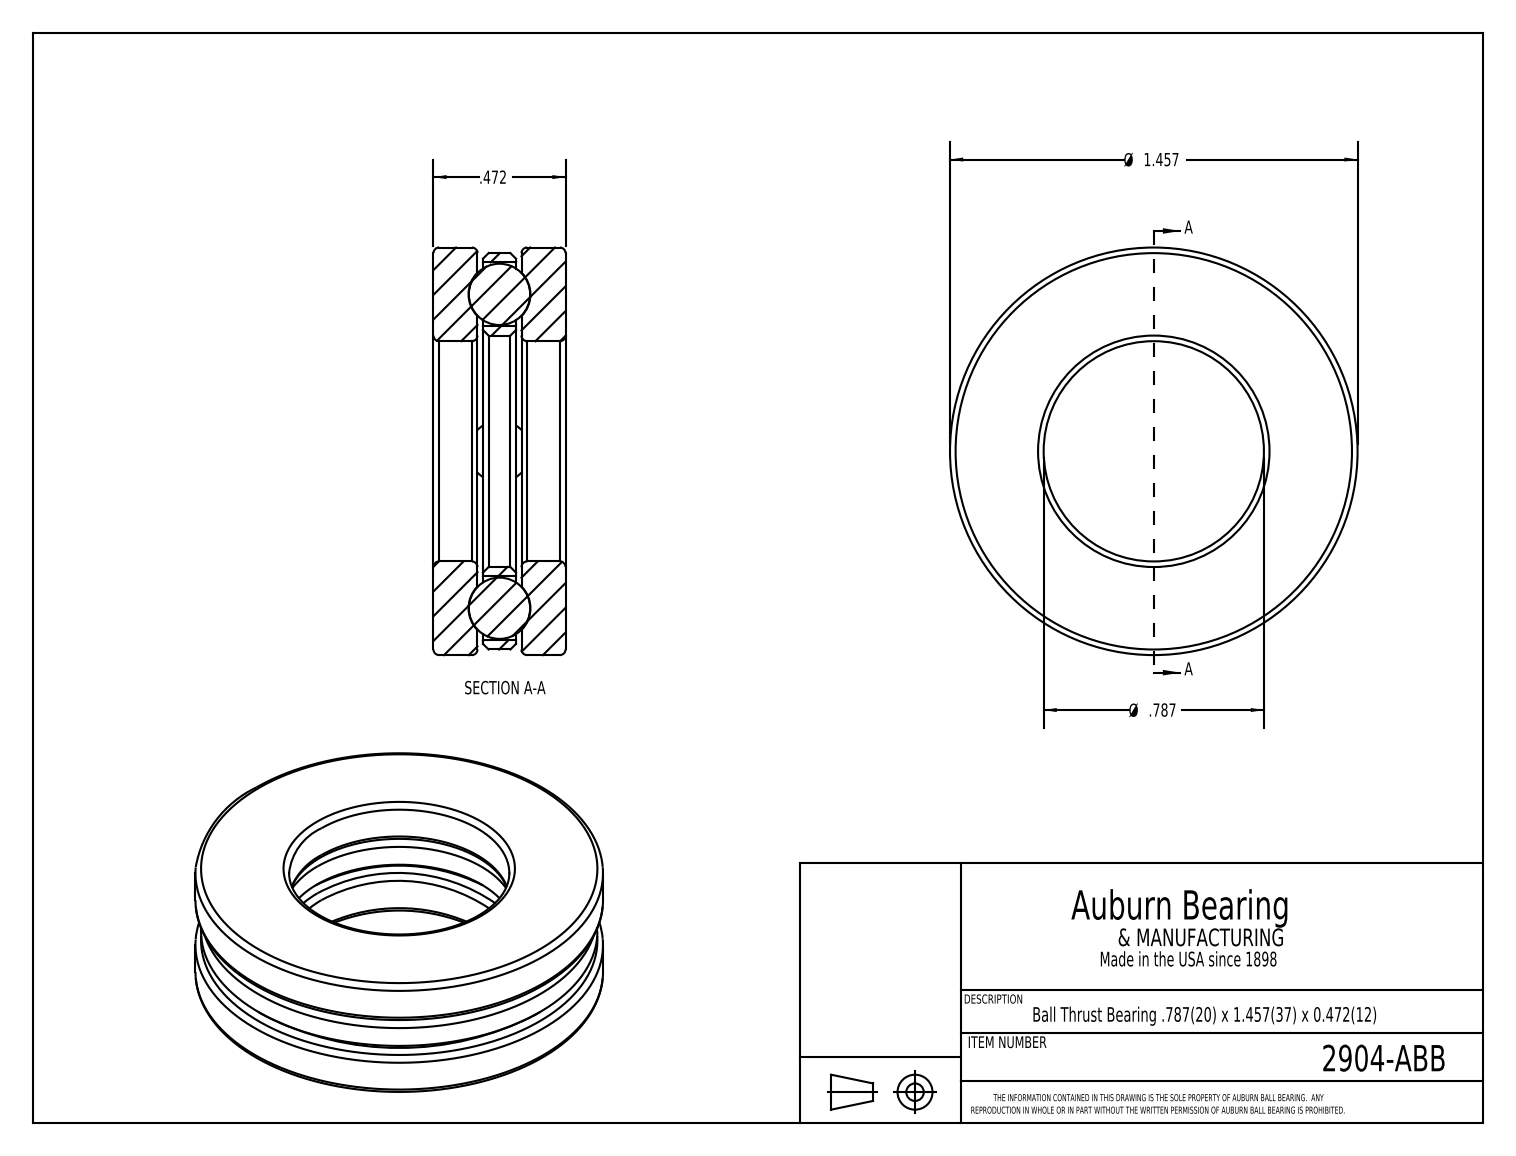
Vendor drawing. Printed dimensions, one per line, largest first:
Ø 1.457
Ø .787
.472
